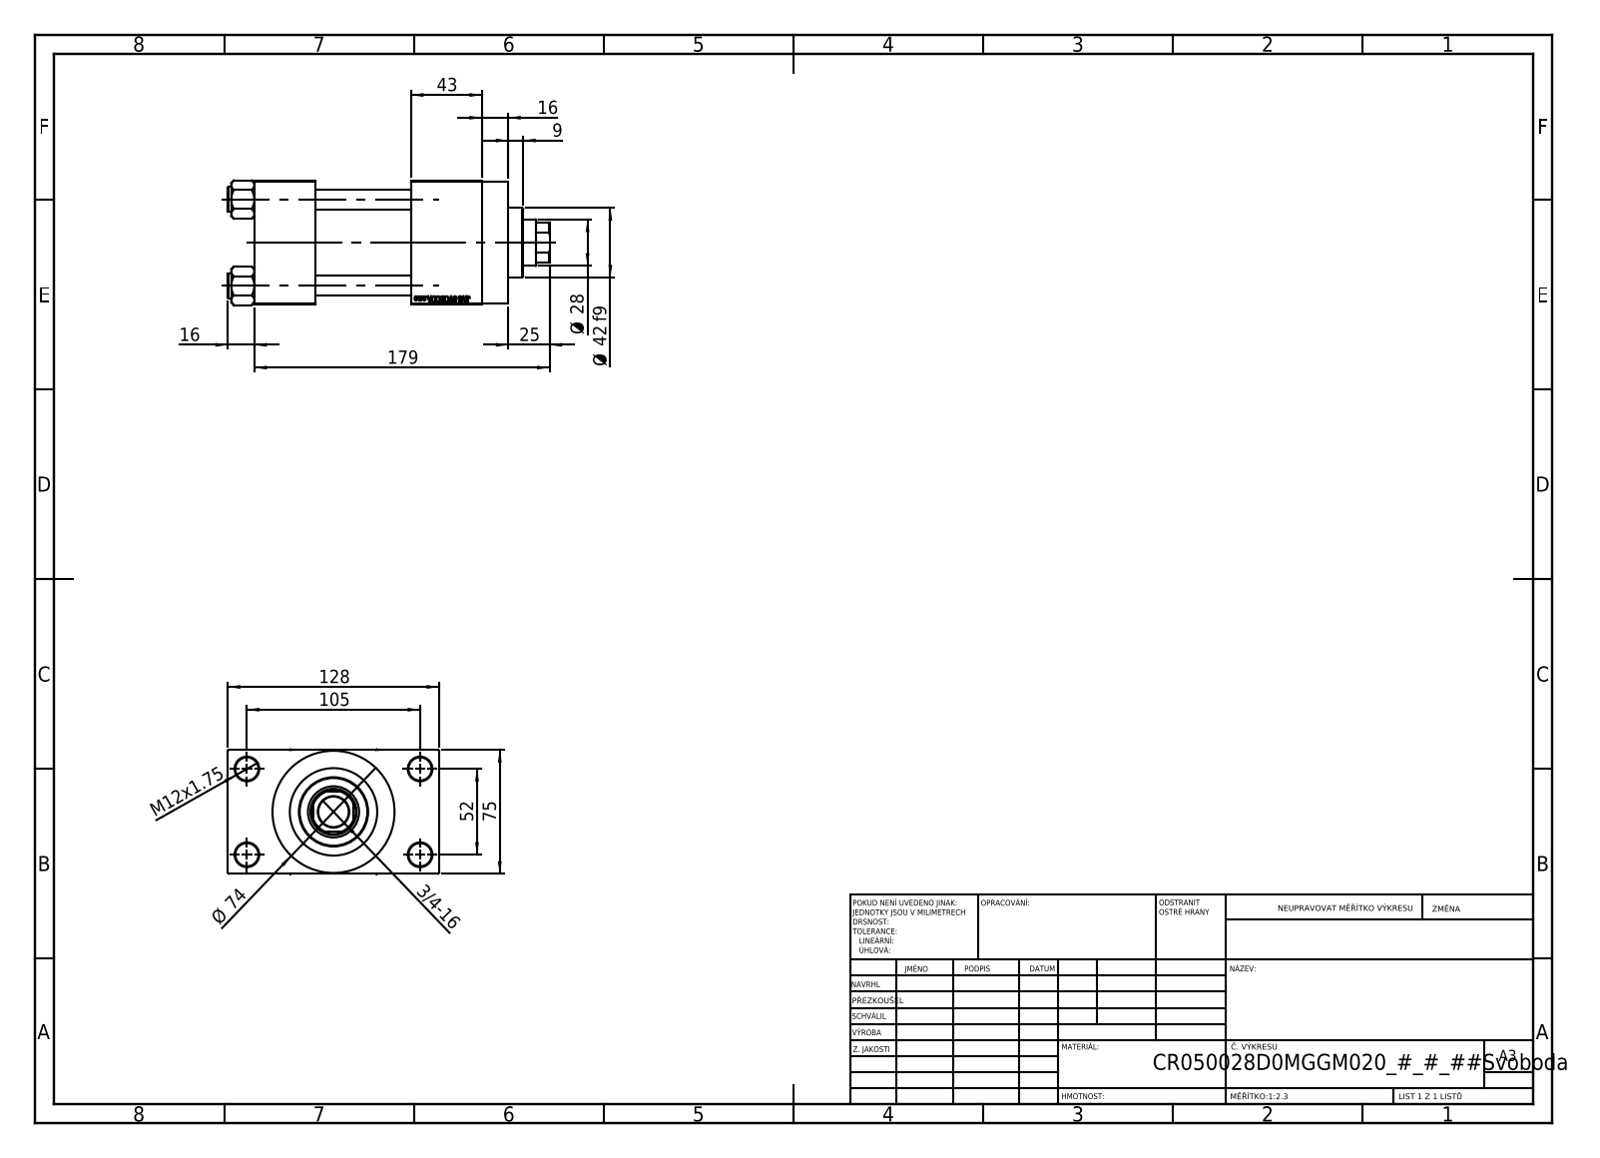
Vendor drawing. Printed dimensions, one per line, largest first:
179
128
105
75
Ø 74
52
43
Ø 42 f9
Ø 28
25
16
16
M12x1.75
9
3/4-16
